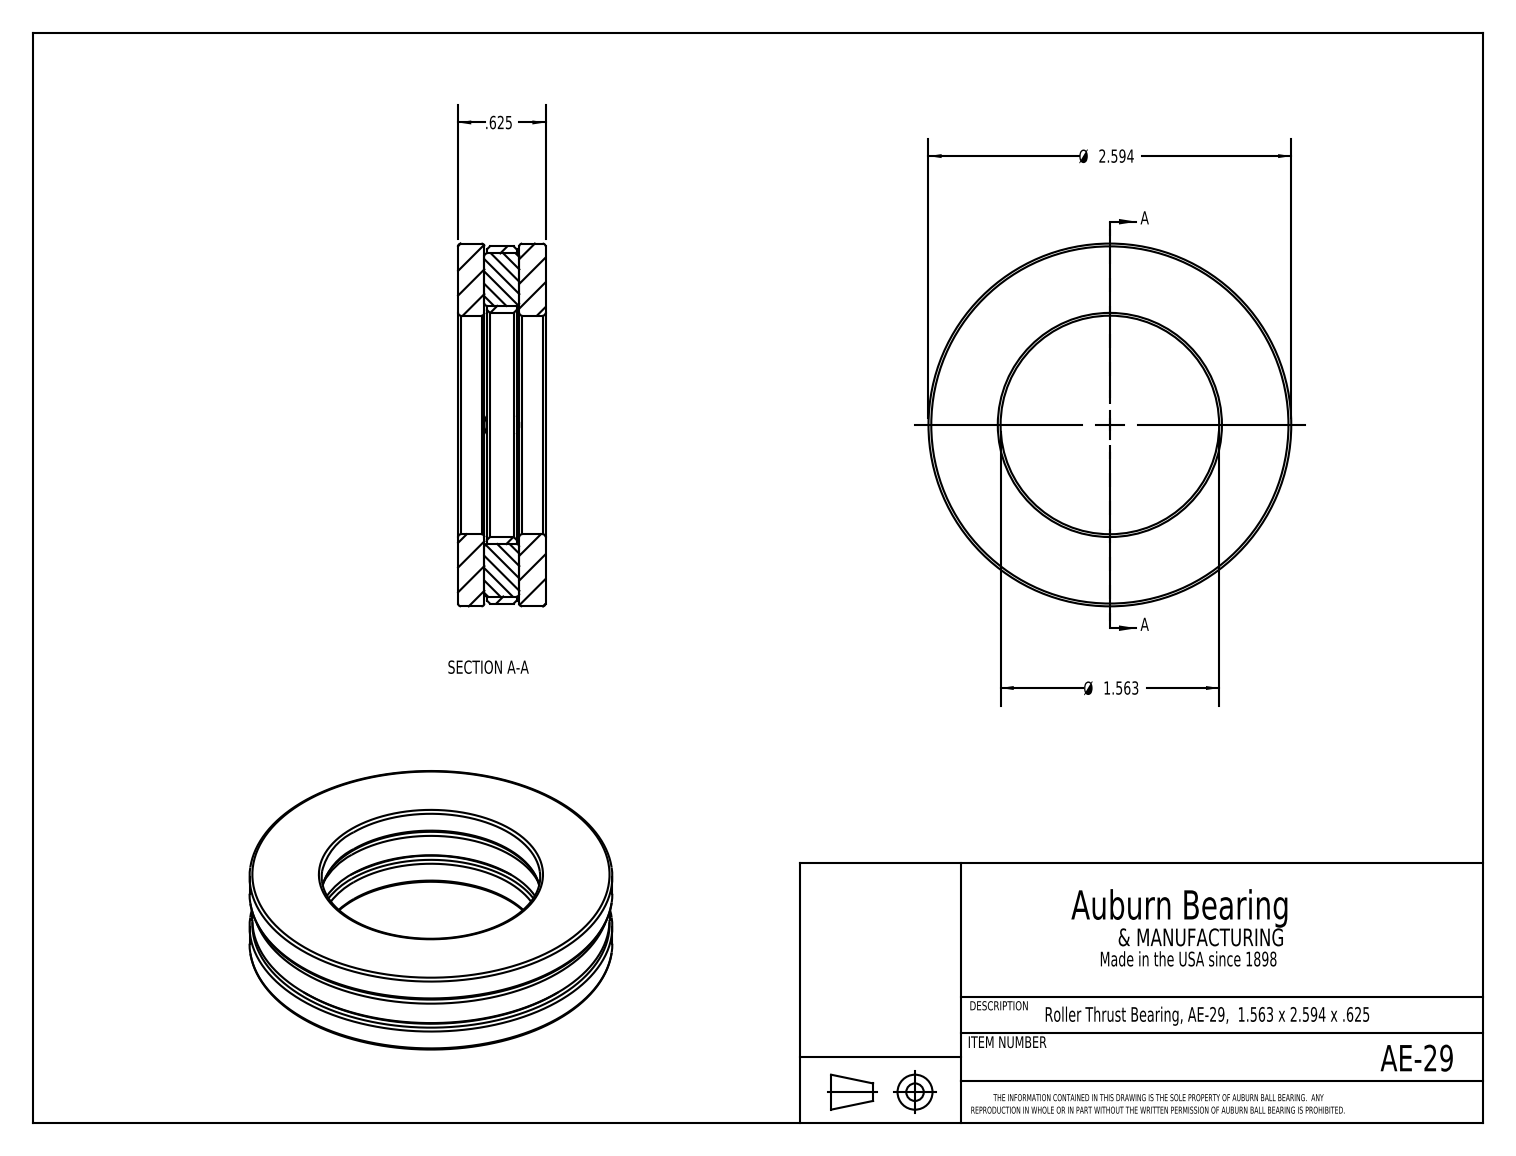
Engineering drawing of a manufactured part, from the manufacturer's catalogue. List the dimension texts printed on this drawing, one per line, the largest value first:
Ø 2.594
Ø 1.563
.625
